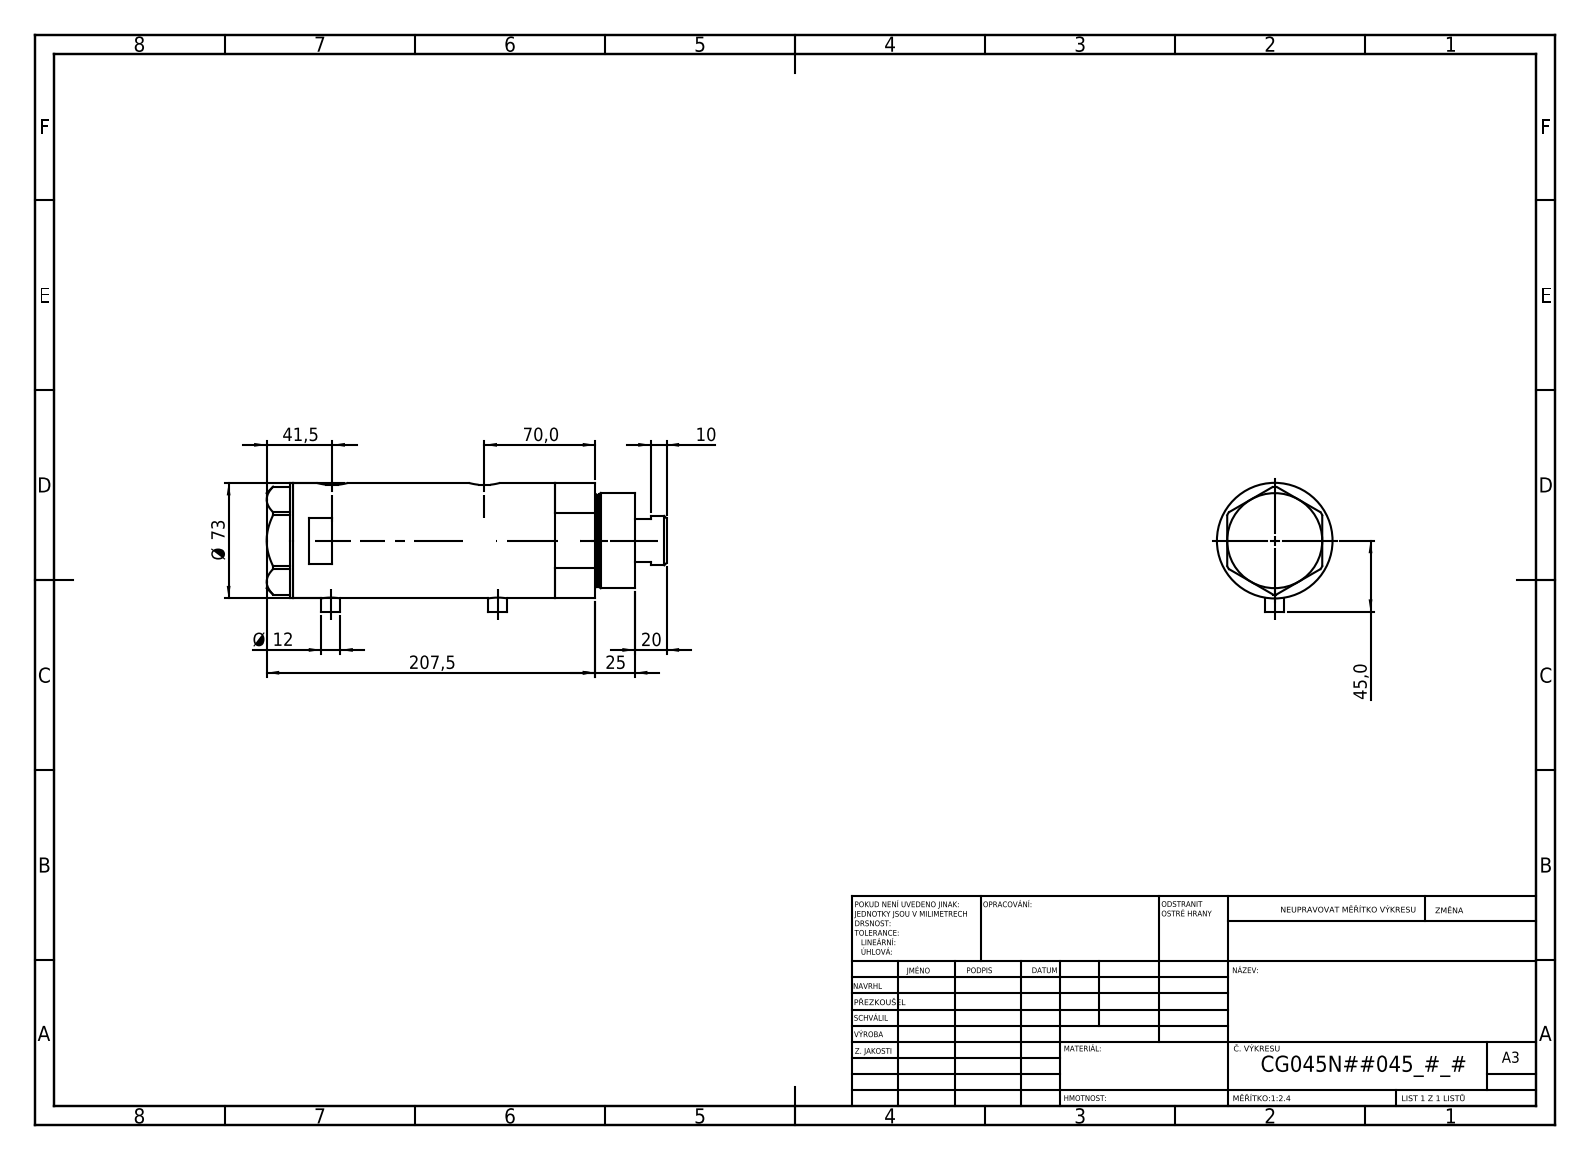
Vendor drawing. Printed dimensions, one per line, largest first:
207,5
Ø 73
70,0
45,0
41,5
25
20
Ø 12
10
